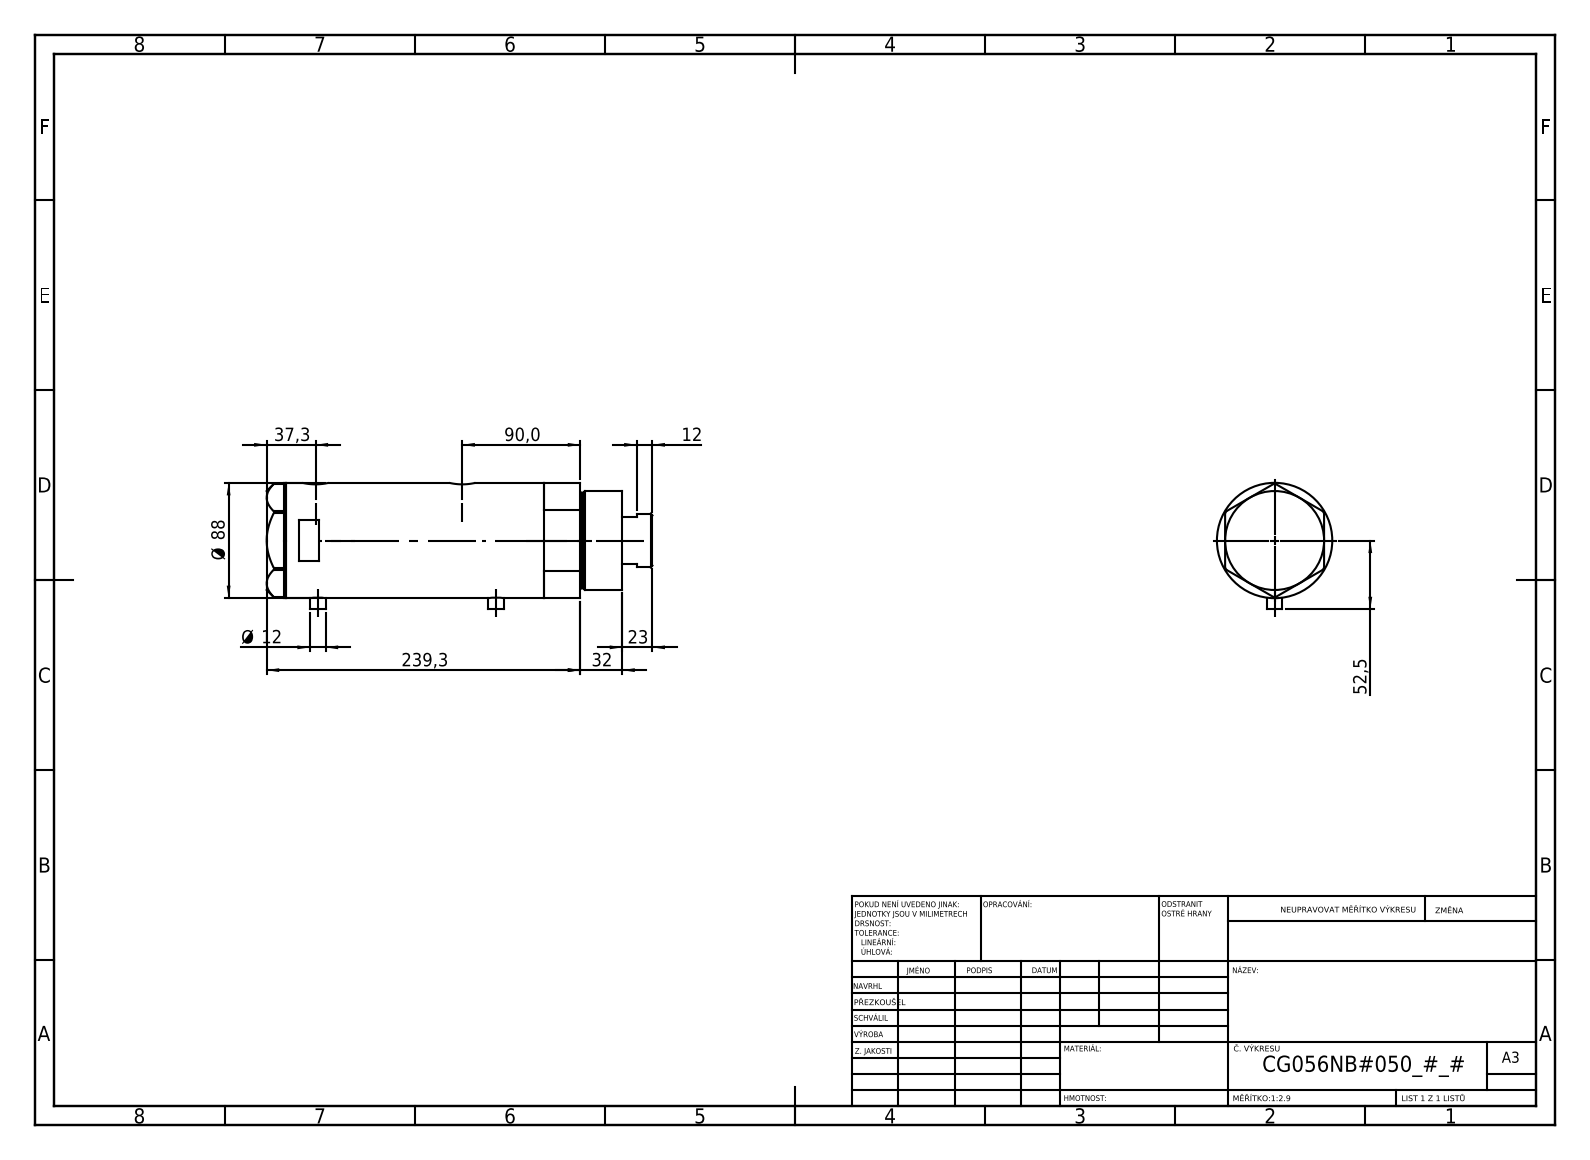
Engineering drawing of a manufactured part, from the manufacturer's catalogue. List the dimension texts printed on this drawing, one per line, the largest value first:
239,3
90,0
Ø 88
52,5
37,3
32
23
12
Ø 12
